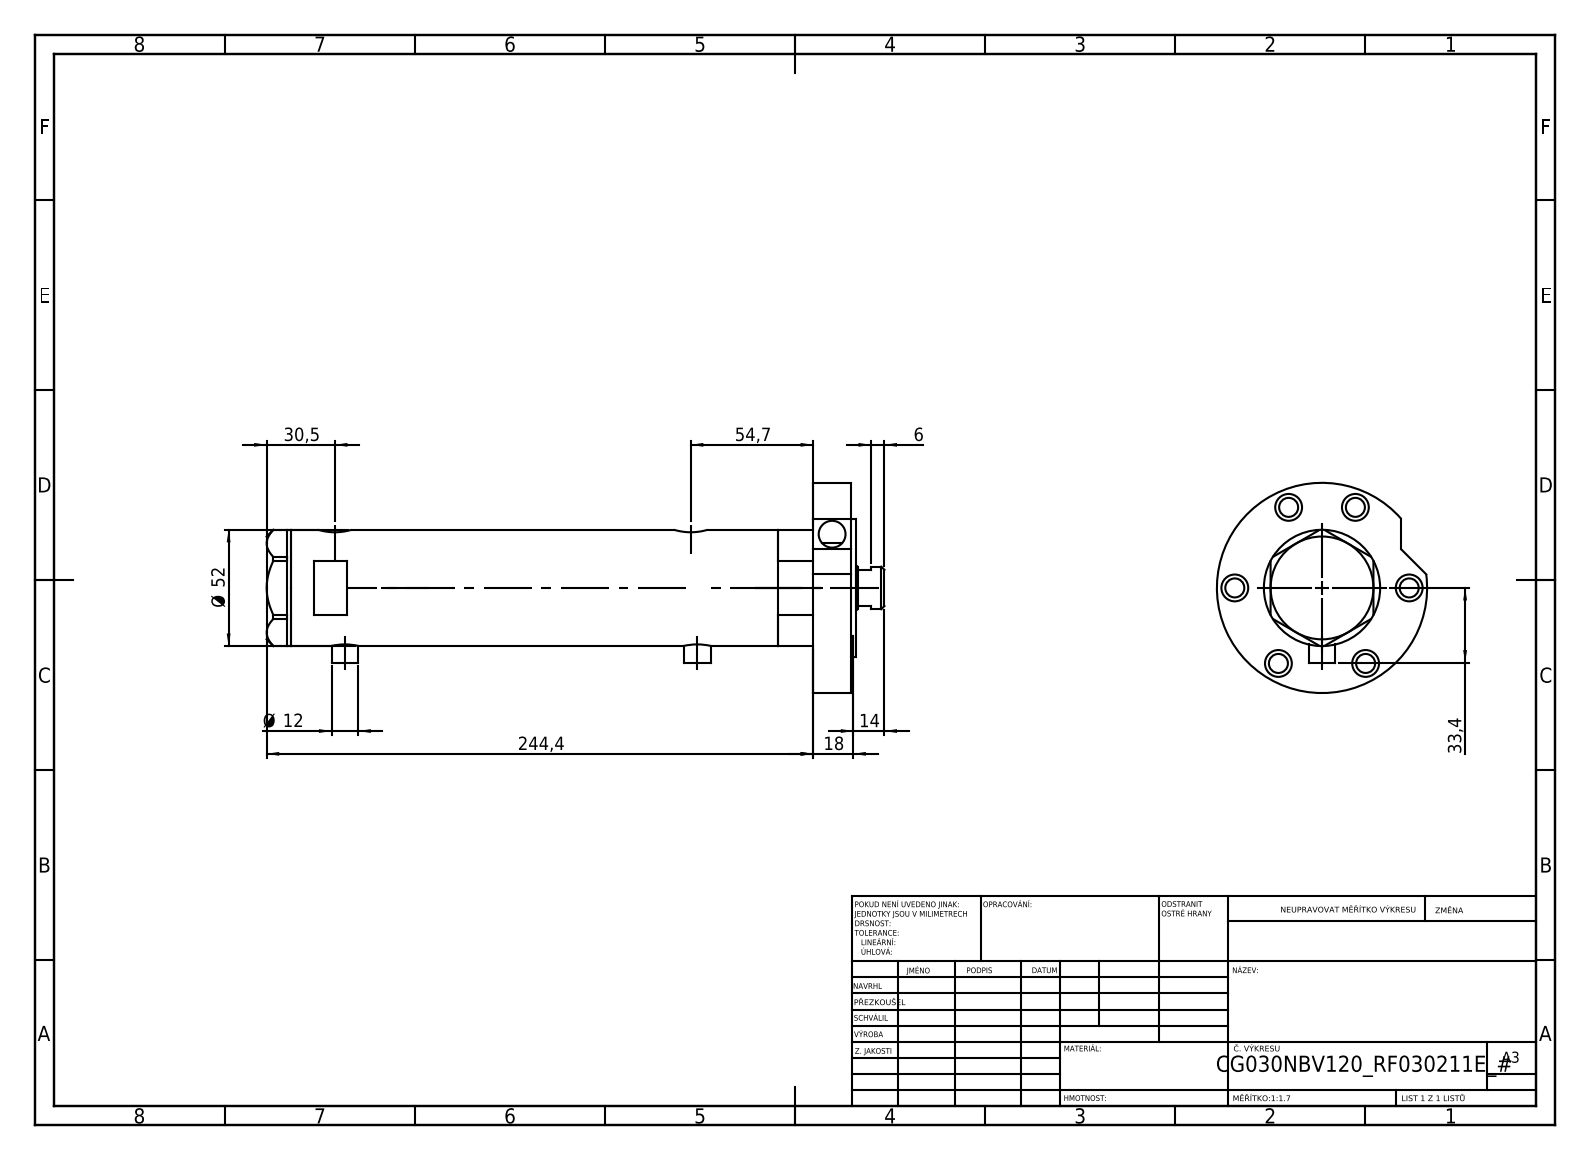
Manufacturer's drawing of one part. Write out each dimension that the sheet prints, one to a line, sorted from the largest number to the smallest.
244,4
54,7
Ø 52
33,4
30,5
18
14
Ø 12
6
